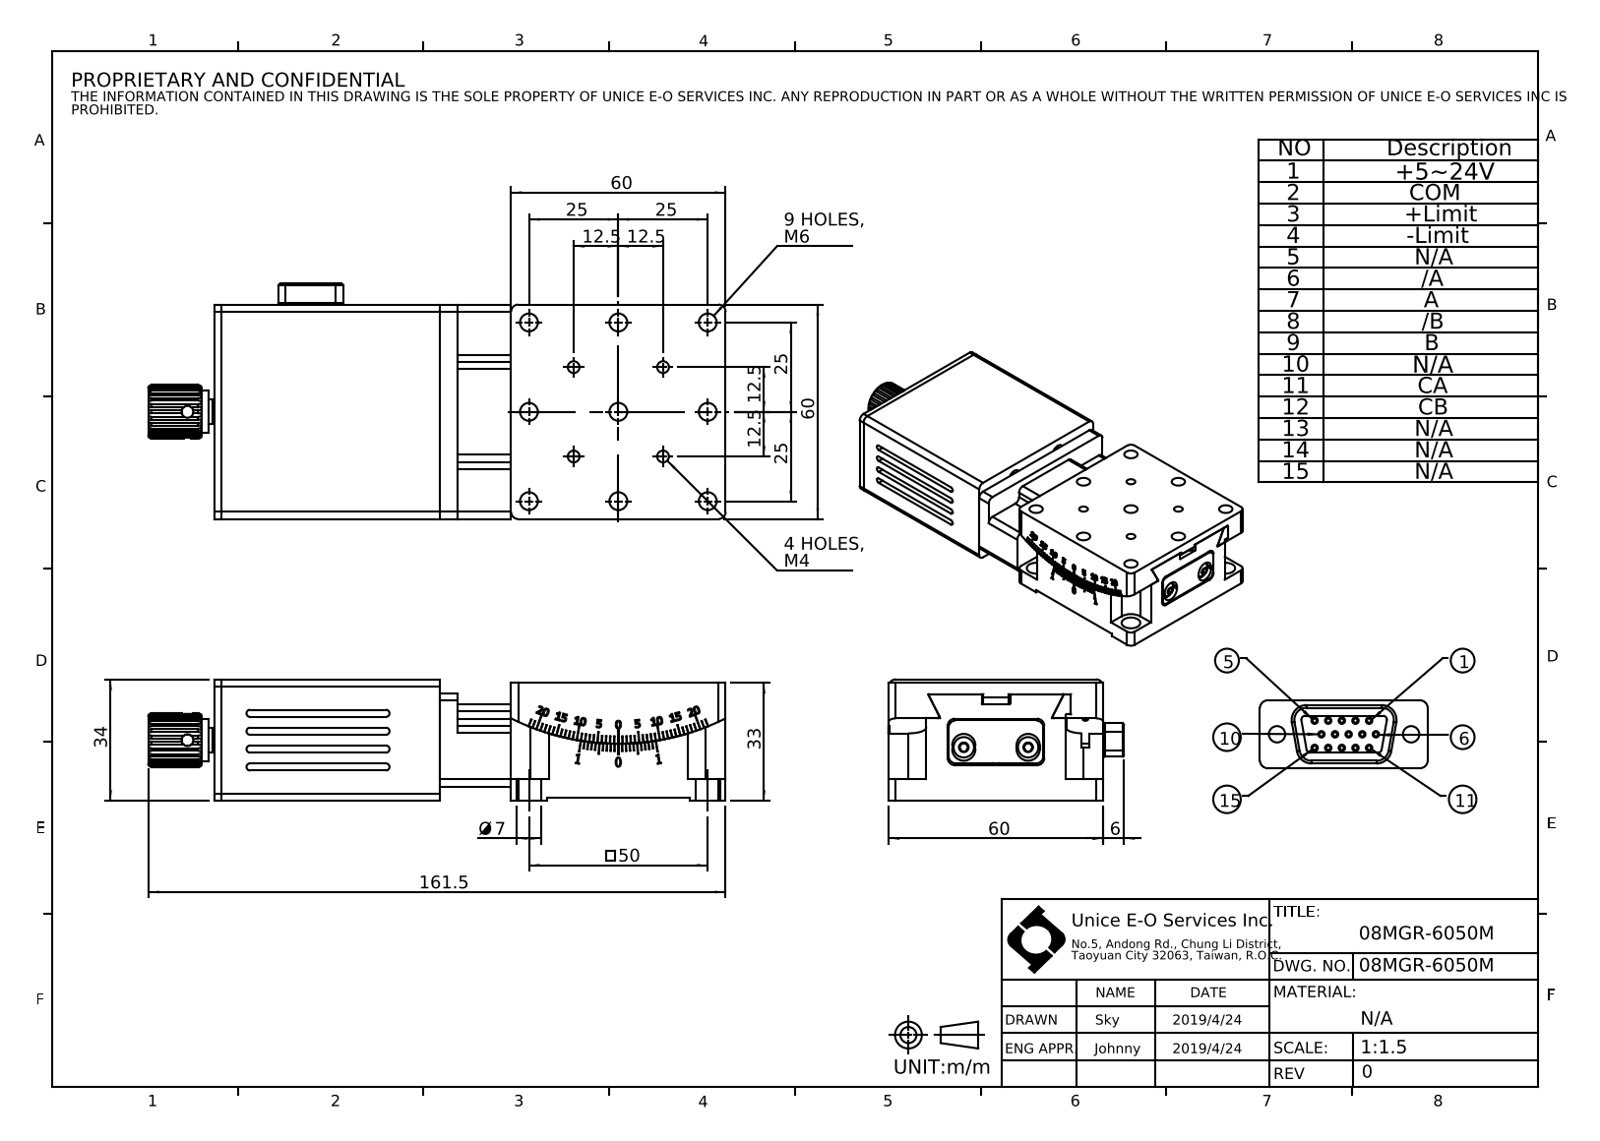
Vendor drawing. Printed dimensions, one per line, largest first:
161.5
60
60
60
50
34
33
25
25
25
25
12.5
12.5
12.5
12.5
9 HOLES, M6
Ø 7
6
4 HOLES, M4
